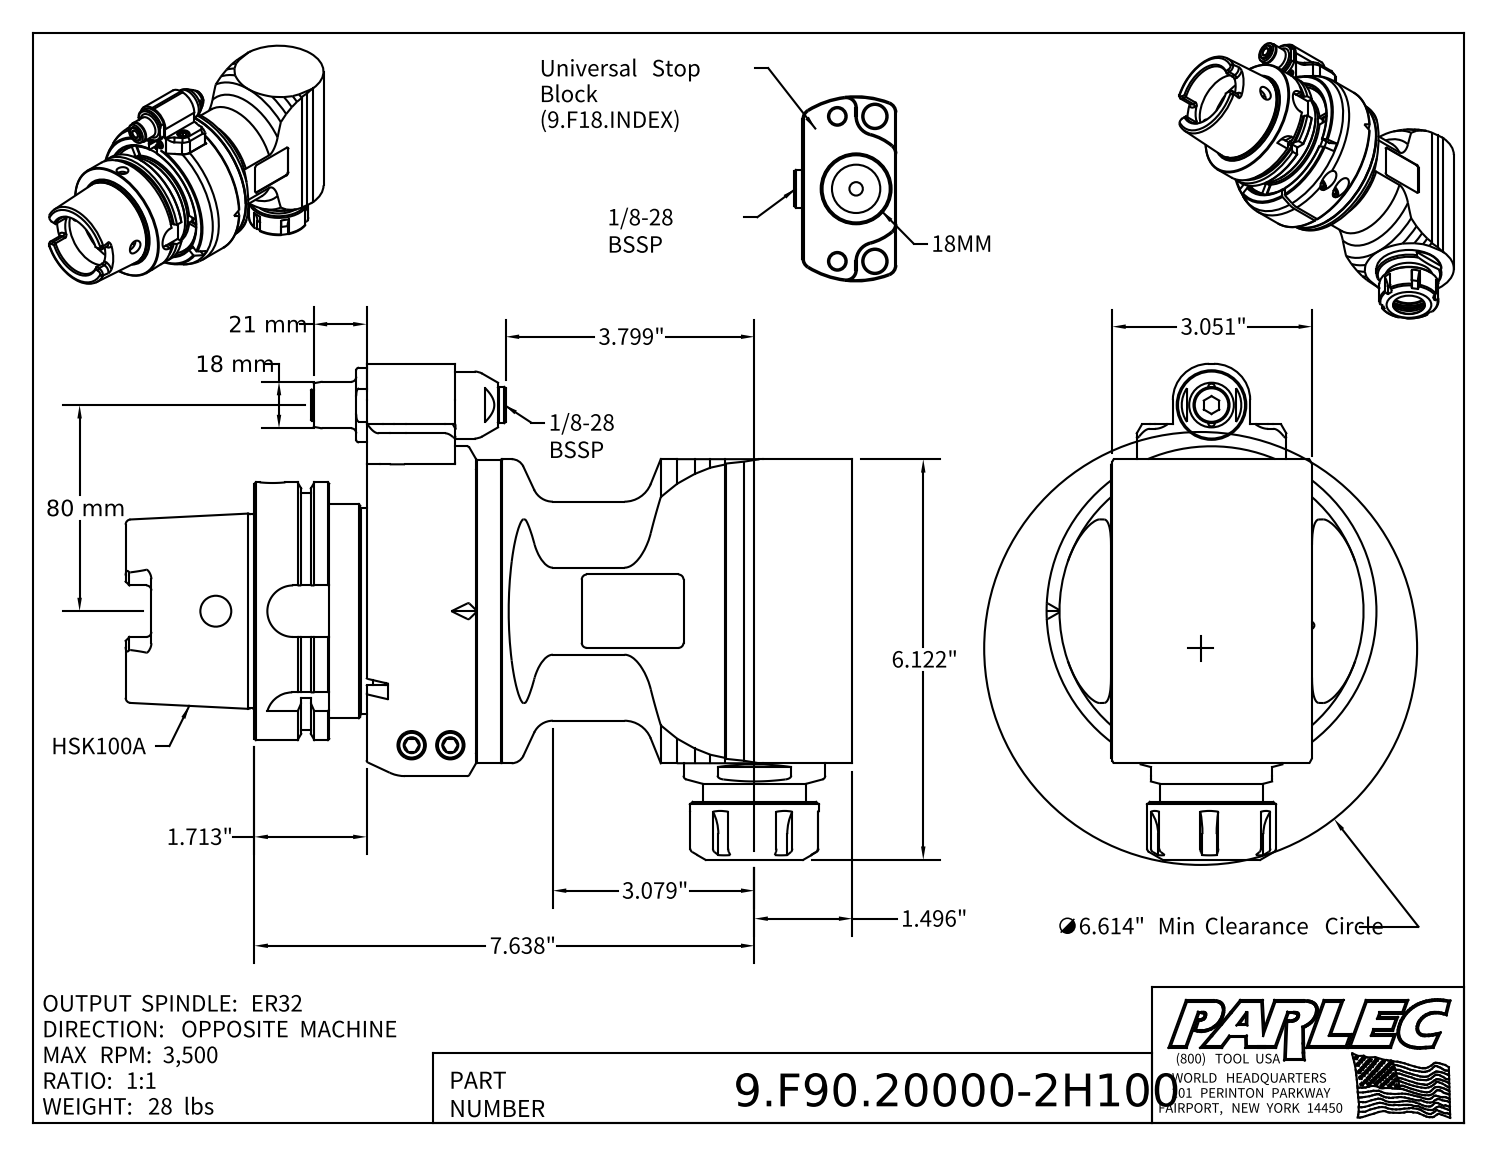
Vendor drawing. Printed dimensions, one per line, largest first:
80 mm
21 mm
18 mm
7.638"
∅6.614" Min Clearance Circle
6.122"
3.799"
3.079"
3.051"
1.713"
1.496"
